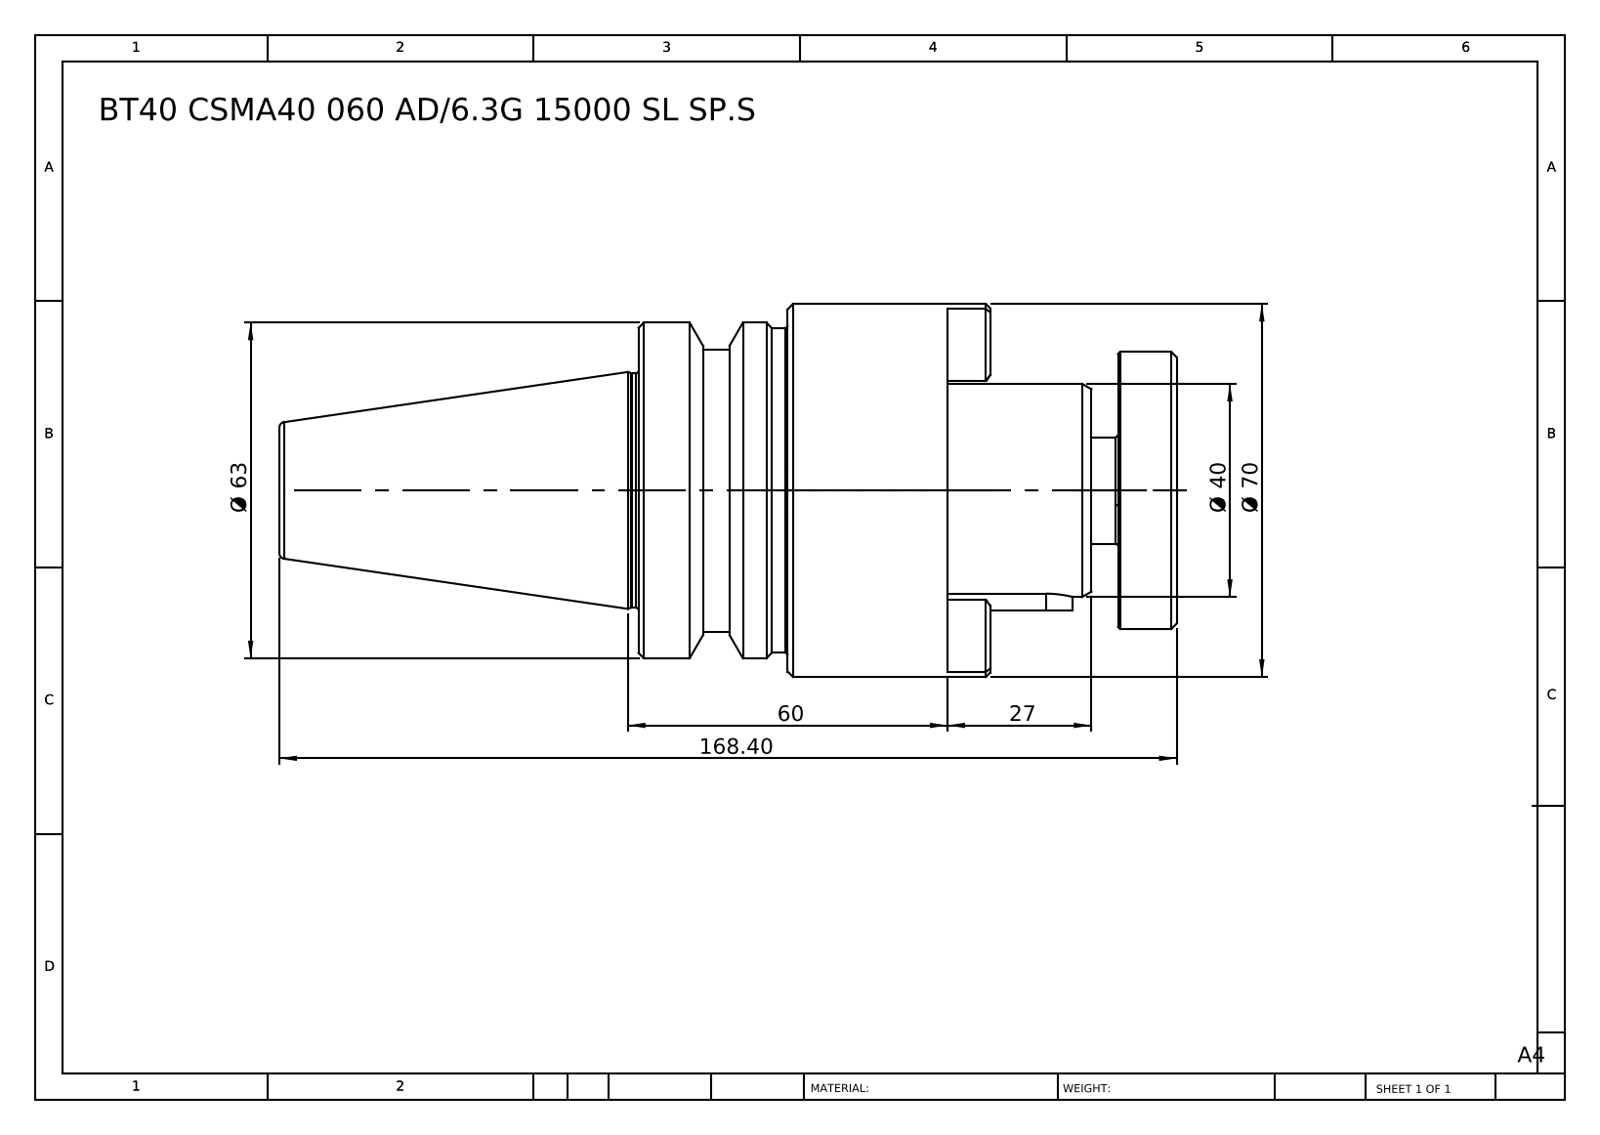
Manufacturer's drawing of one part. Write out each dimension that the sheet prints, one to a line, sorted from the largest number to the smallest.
168.40
Ø 70
Ø 63
60
Ø 40
27
